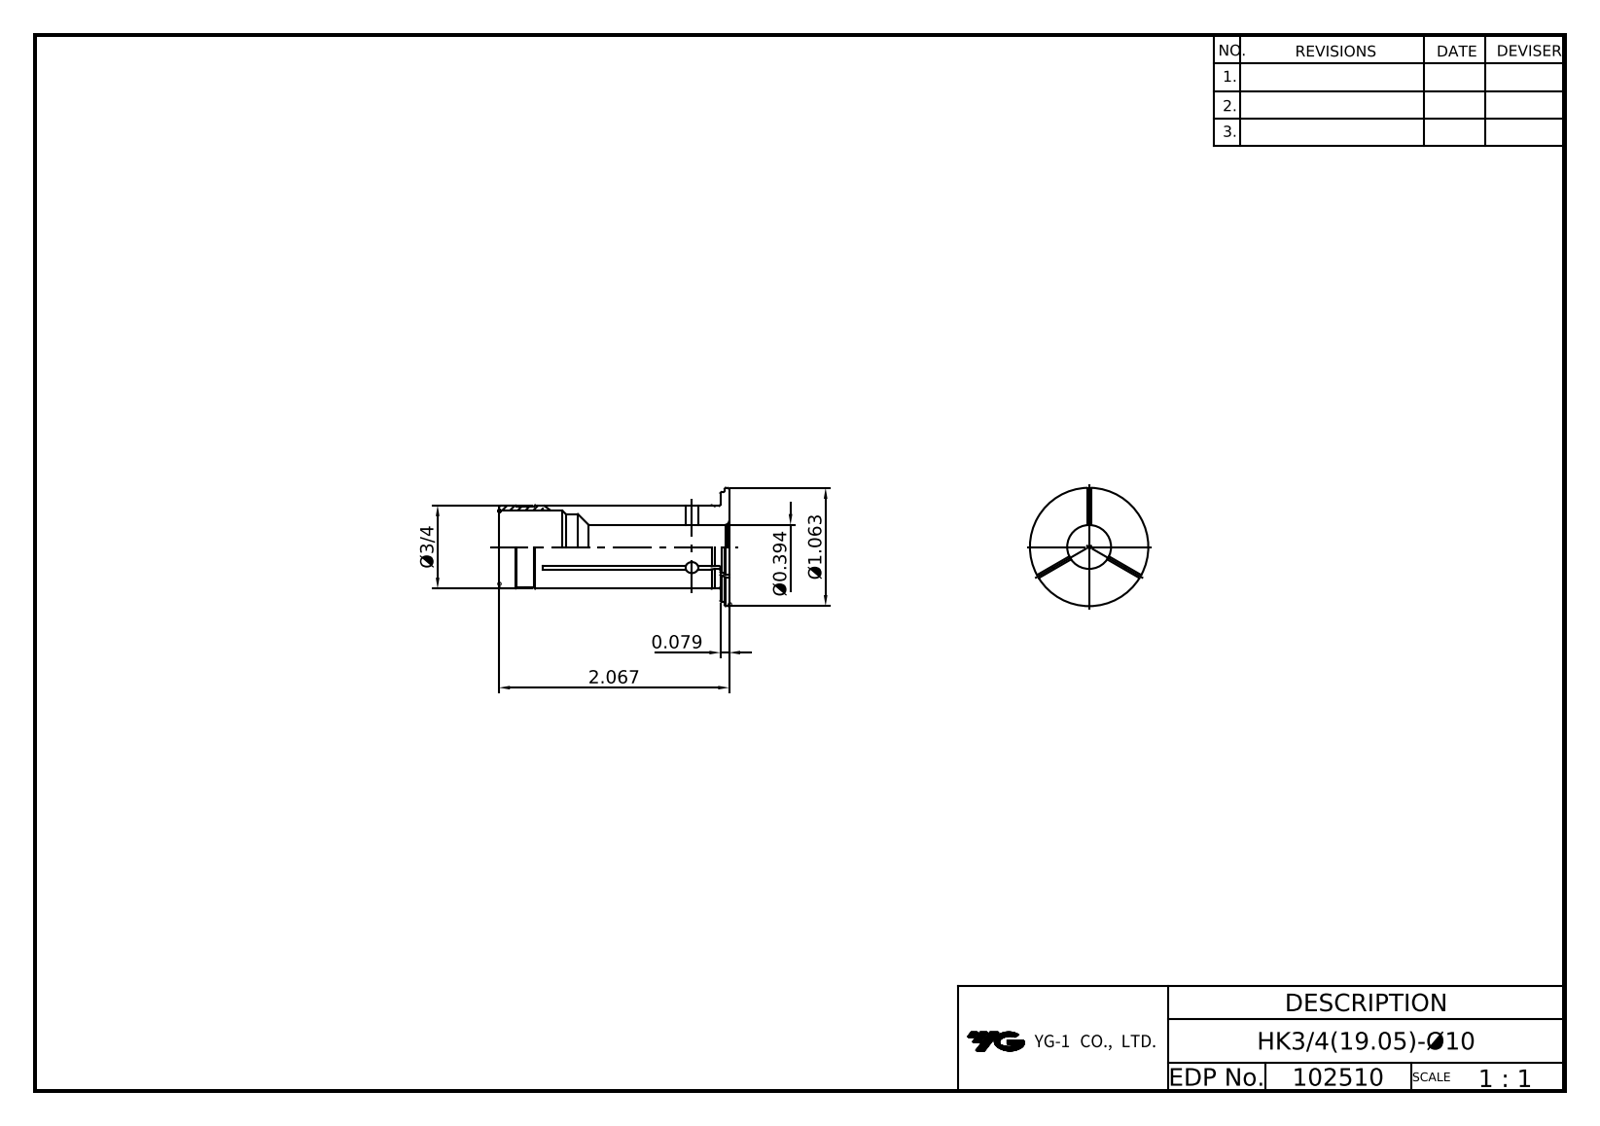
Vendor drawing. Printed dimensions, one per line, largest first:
2.067
Ø1.063
Ø3/4
0.079
